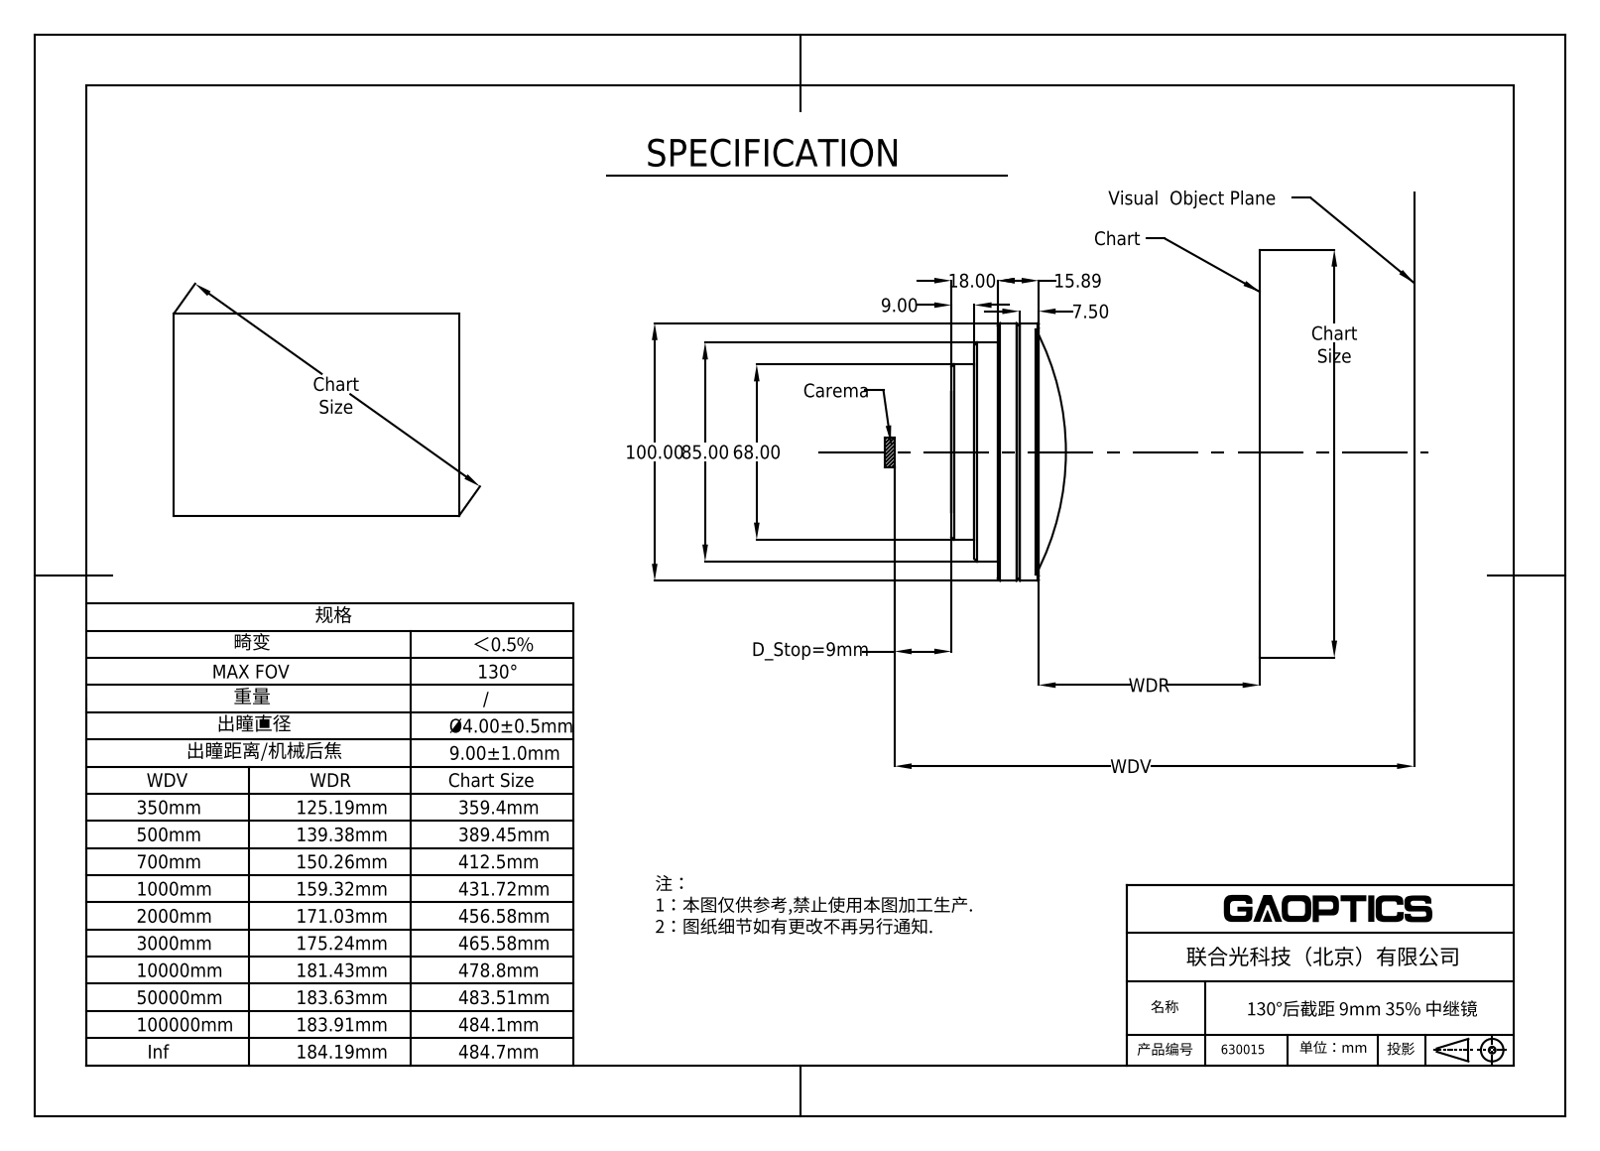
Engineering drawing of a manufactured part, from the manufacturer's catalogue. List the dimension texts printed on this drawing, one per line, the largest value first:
100.00
85.00
68.00
18.00
15.89
D_Stop=9mm
9.00
7.50
Chart Size
Chart Size
WDV
WDR
